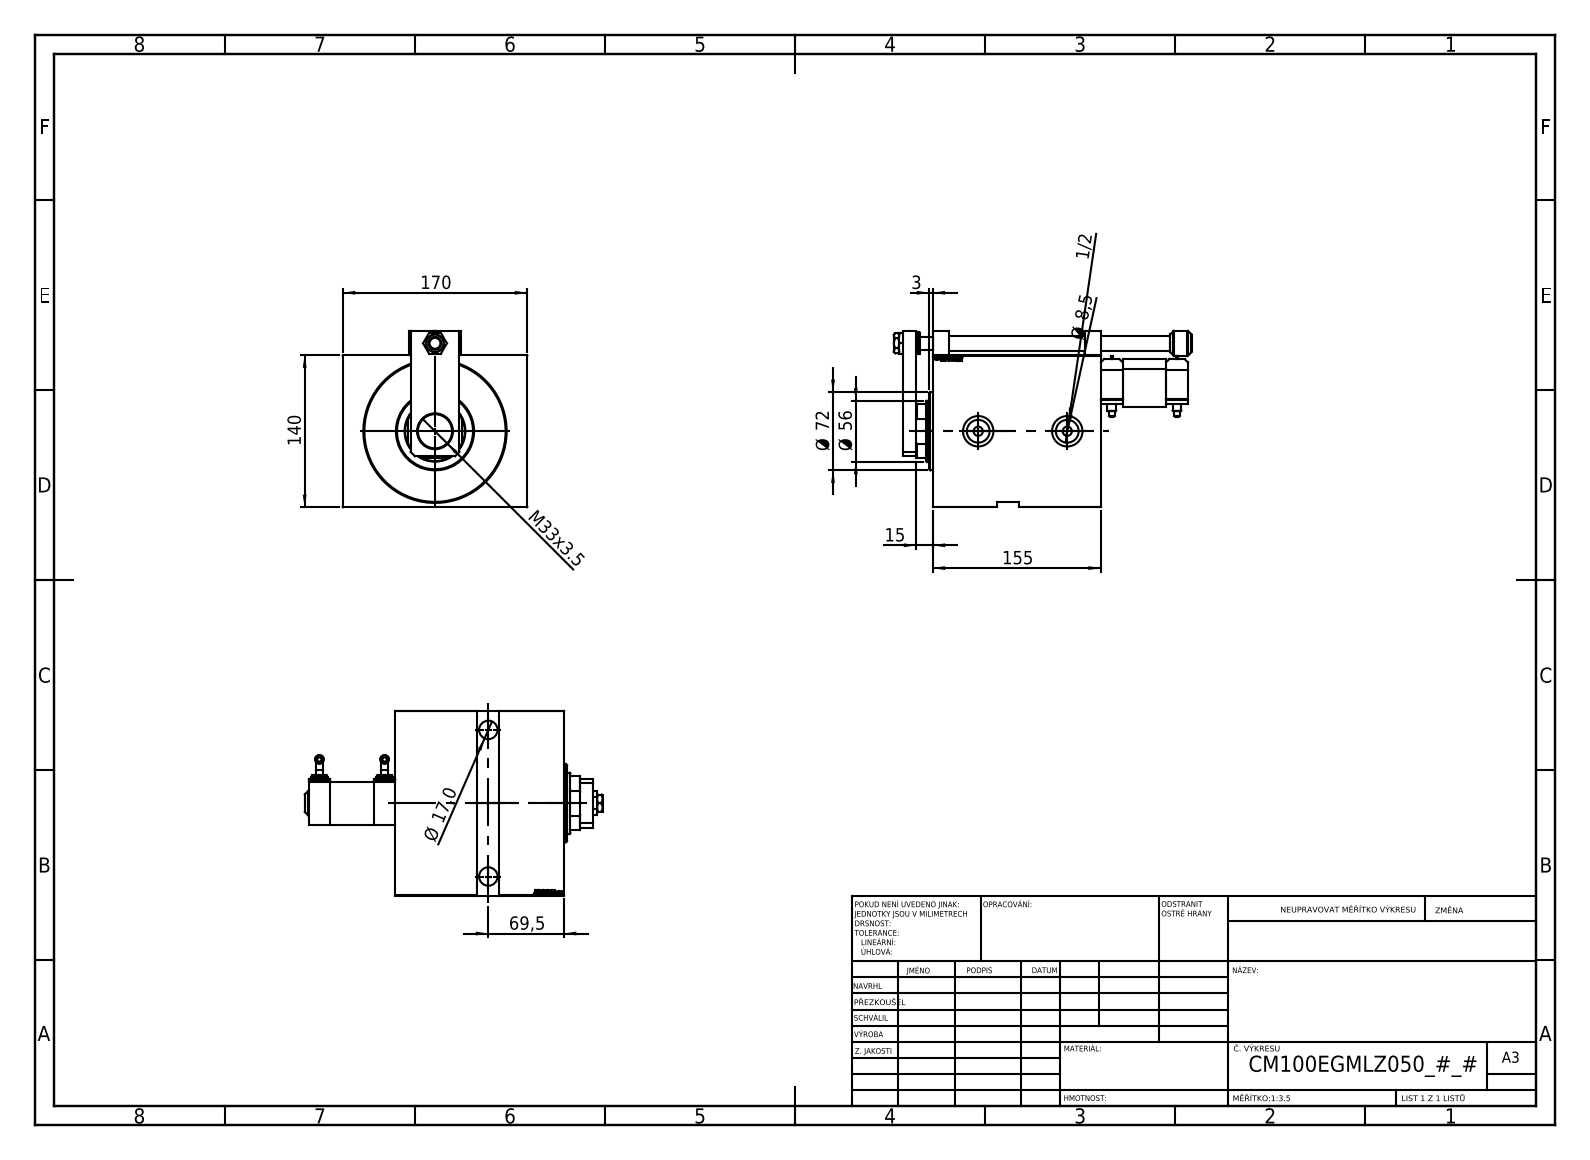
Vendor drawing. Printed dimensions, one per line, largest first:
170
155
140
Ø 72
69,5
Ø 56
M33x3.5
Ø 17,0
15
Ø 8,5
3
1/2
